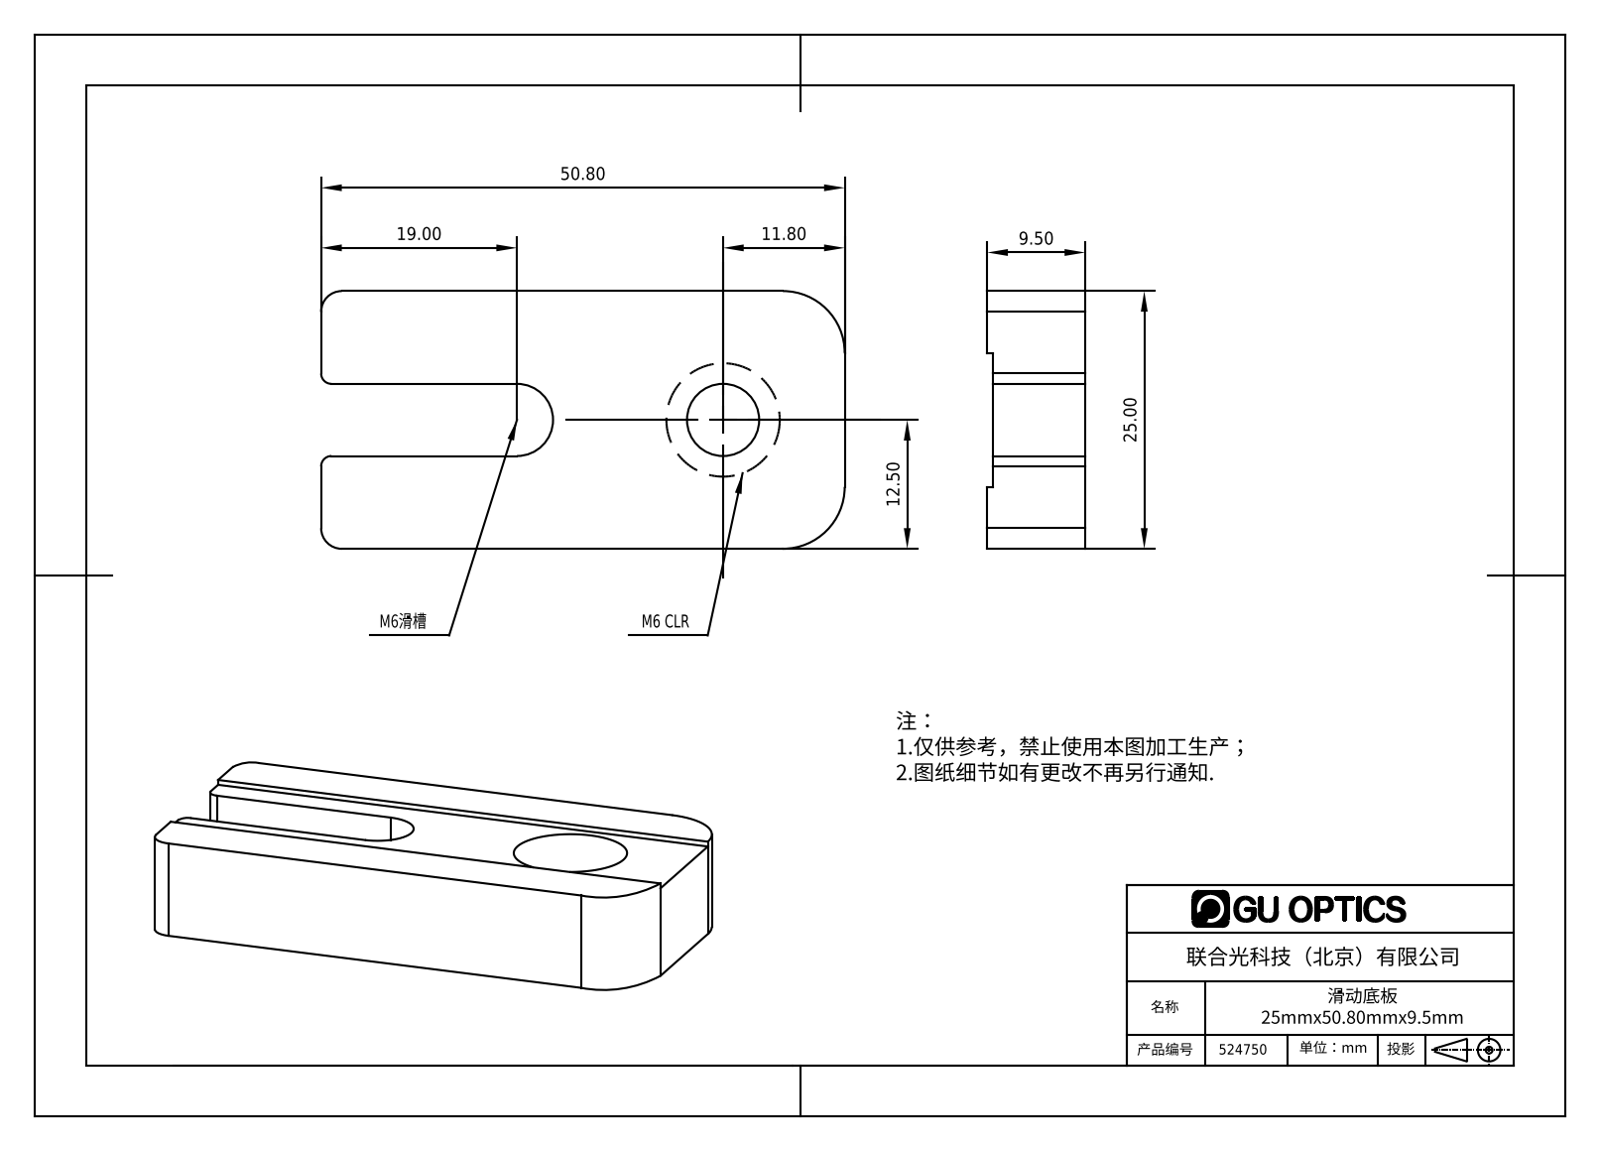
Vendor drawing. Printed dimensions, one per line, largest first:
50.80
25.00
19.00
12.50
11.80
9.50
